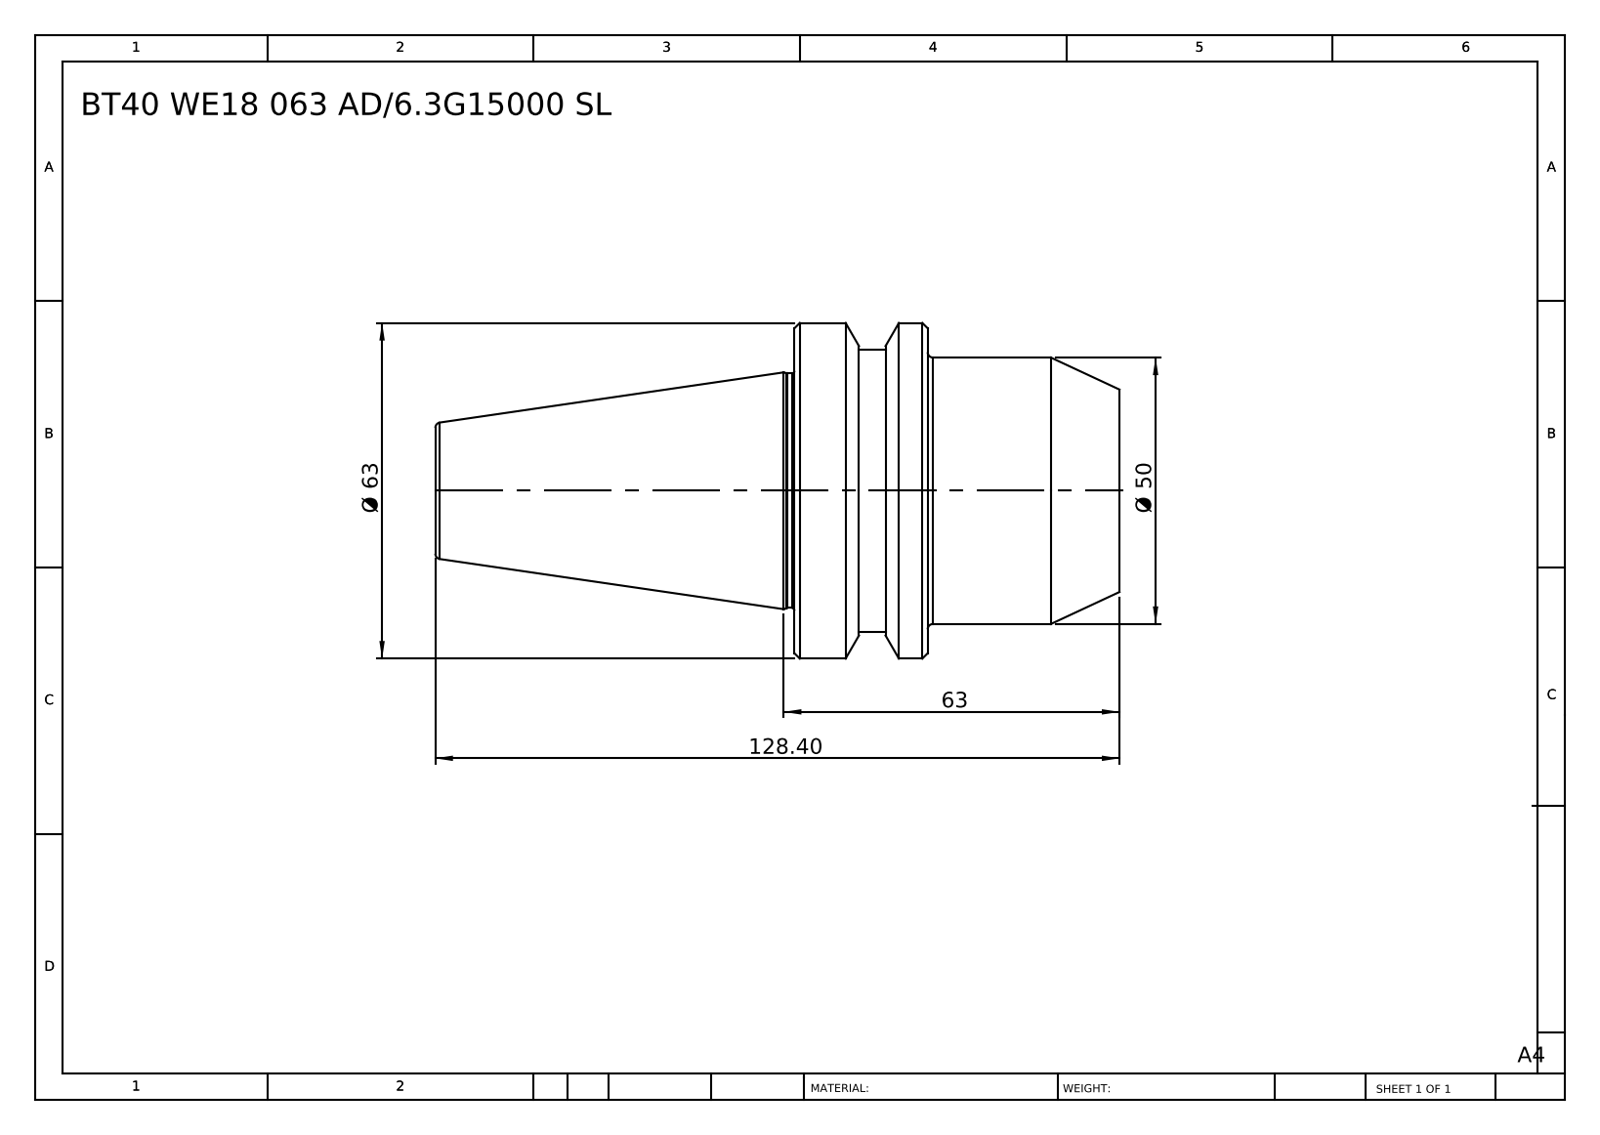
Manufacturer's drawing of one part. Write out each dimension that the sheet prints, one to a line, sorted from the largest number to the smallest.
128.40
63
Ø 63
Ø 50
